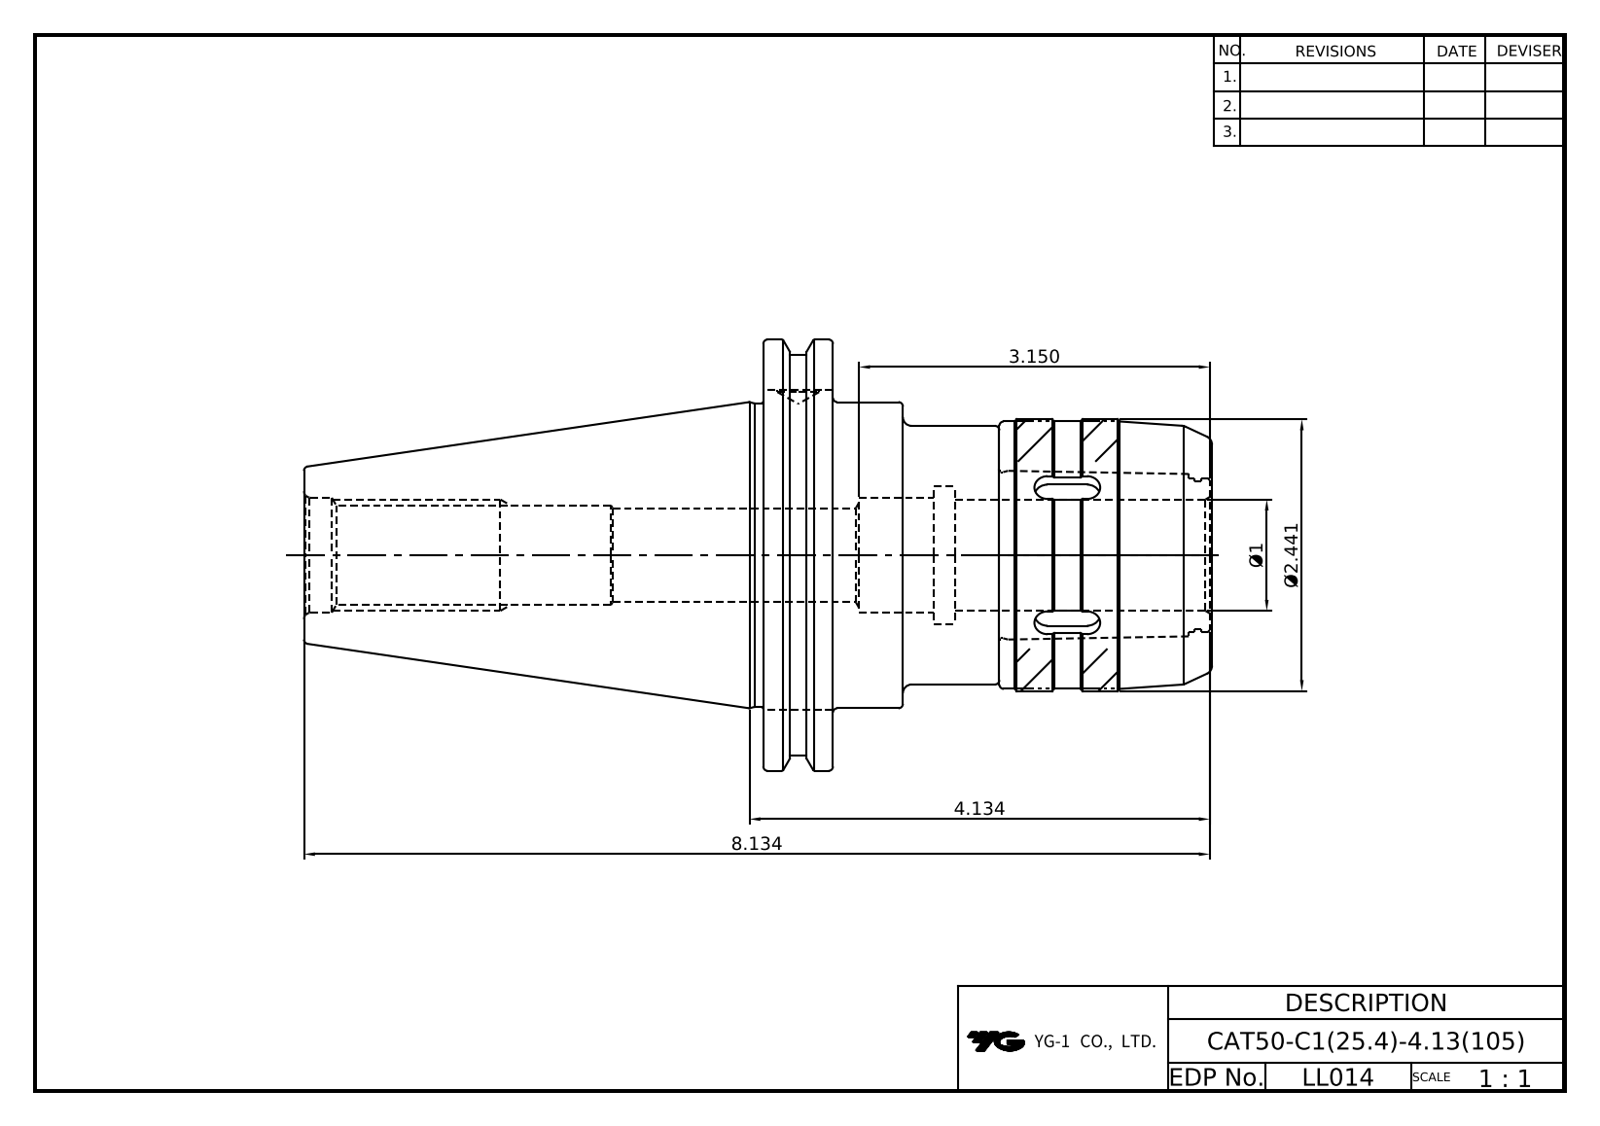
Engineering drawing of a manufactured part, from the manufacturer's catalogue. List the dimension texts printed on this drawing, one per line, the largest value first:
8.134
4.134
3.150
Ø2.441
Ø1
